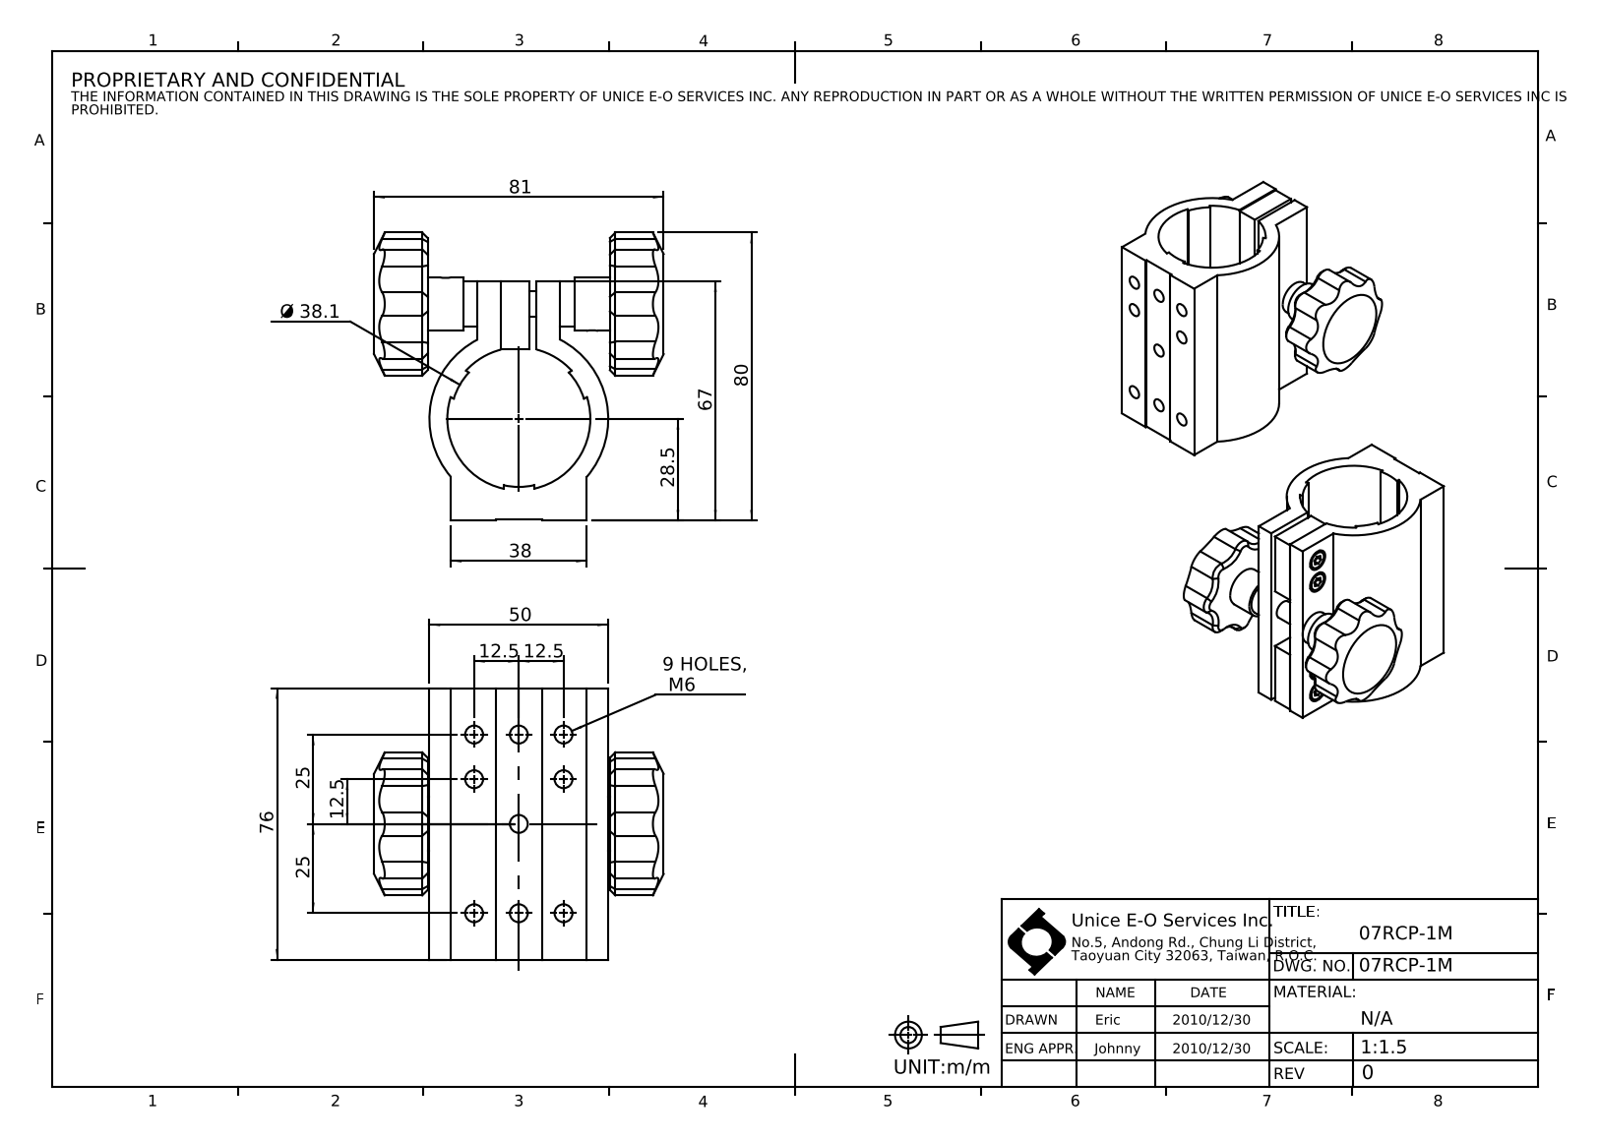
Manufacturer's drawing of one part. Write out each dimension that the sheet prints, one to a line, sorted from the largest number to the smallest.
81
80
76
67
50
Ø 38.1
38
28.5
25
25
12.5
12.5
12.5
9 HOLES, M6
